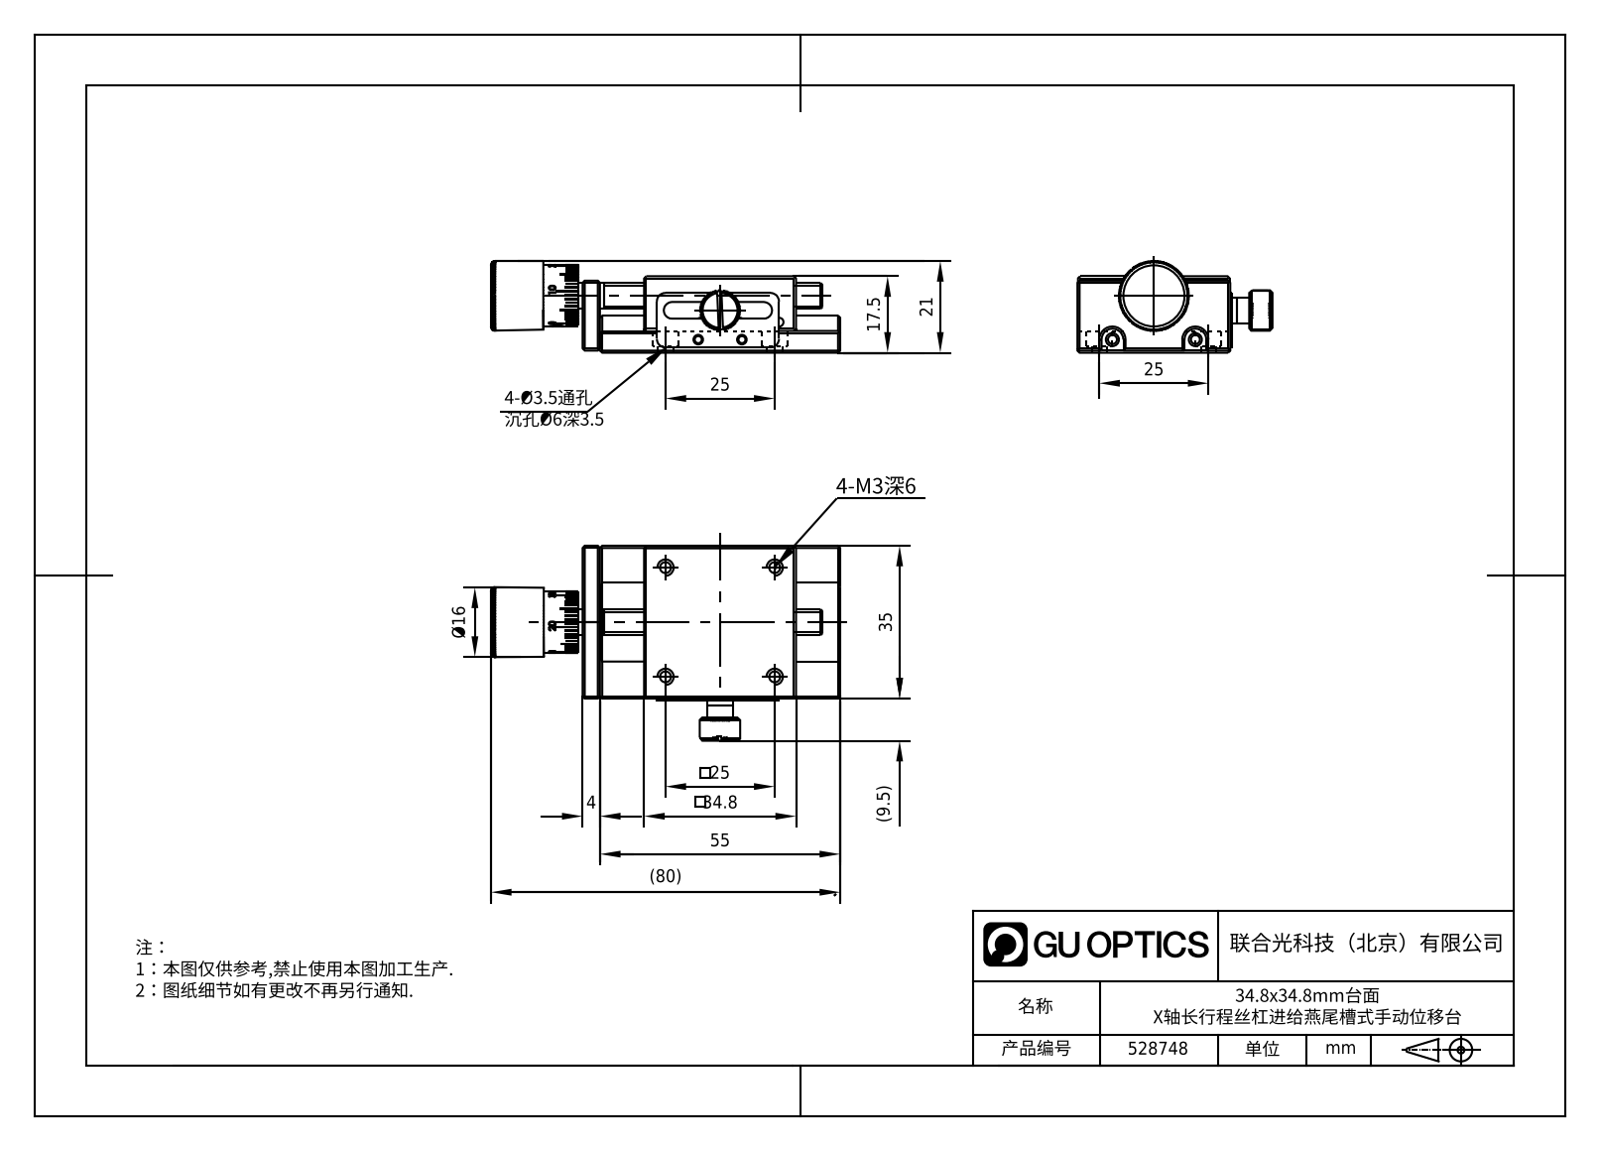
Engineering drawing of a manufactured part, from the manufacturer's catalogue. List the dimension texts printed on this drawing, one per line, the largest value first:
(80)
55
35
34.8
25
25
25
21
17.5
Ø16
(9.5)
4
